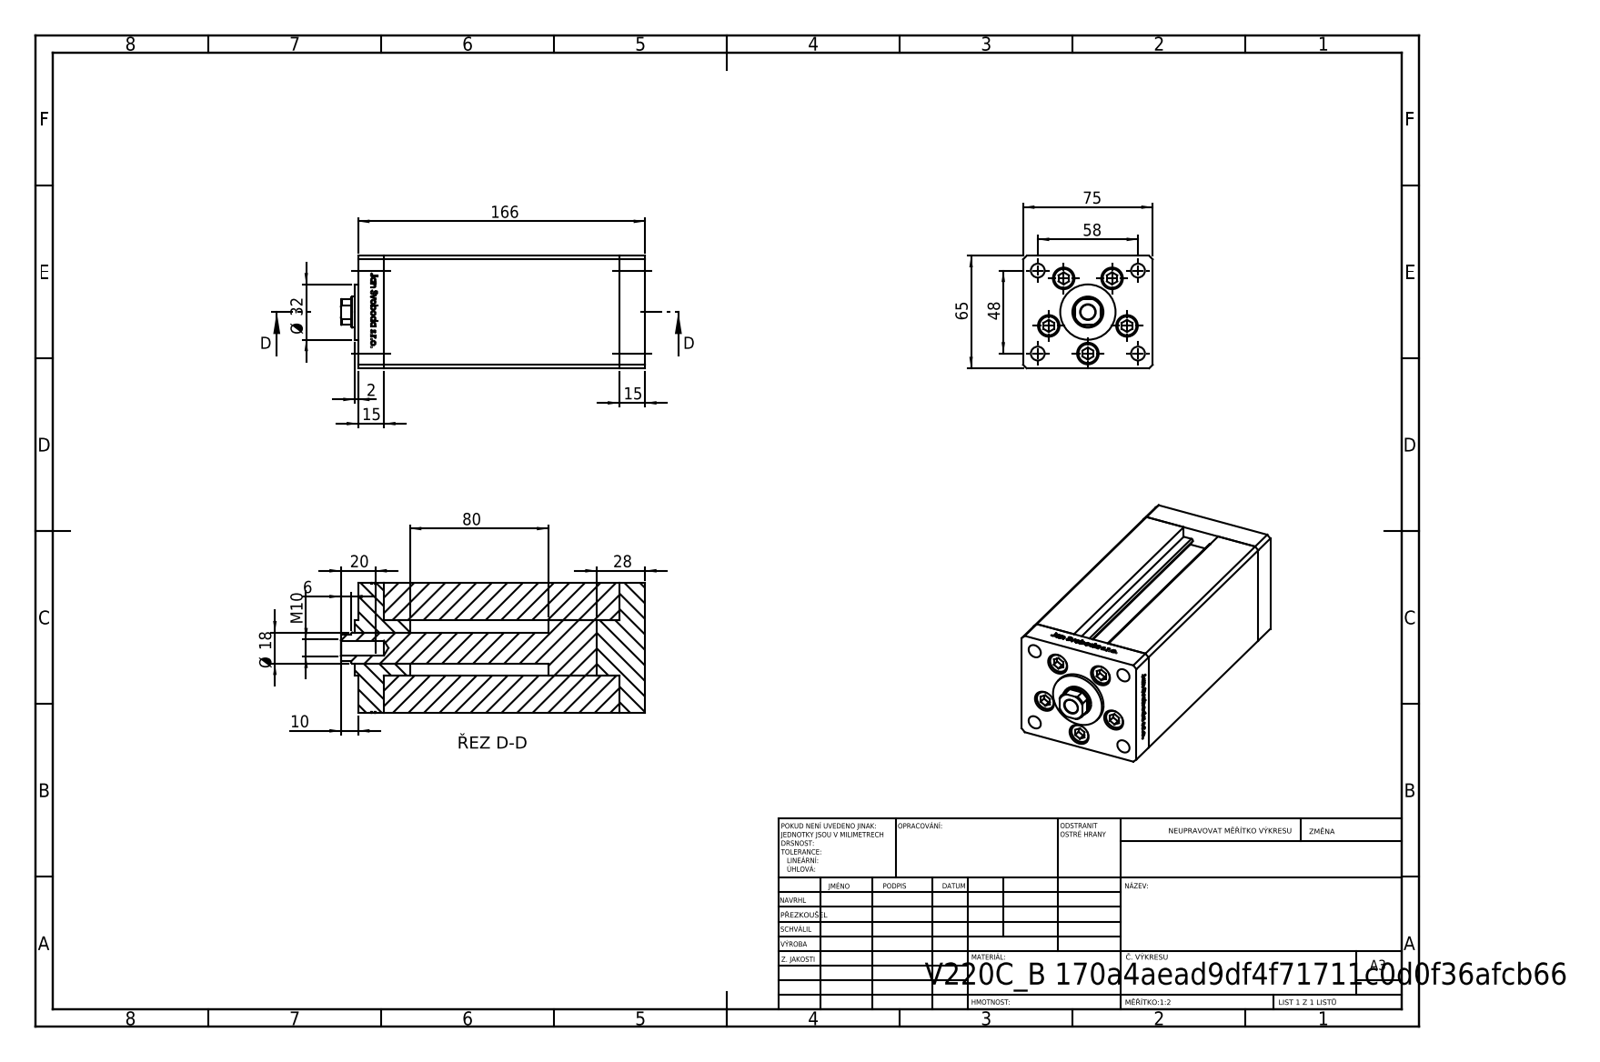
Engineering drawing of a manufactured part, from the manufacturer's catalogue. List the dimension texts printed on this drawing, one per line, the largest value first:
166
80
75
65
58
48
Ø 32
28
20
Ø 18
15
15
M10
10
6
2
